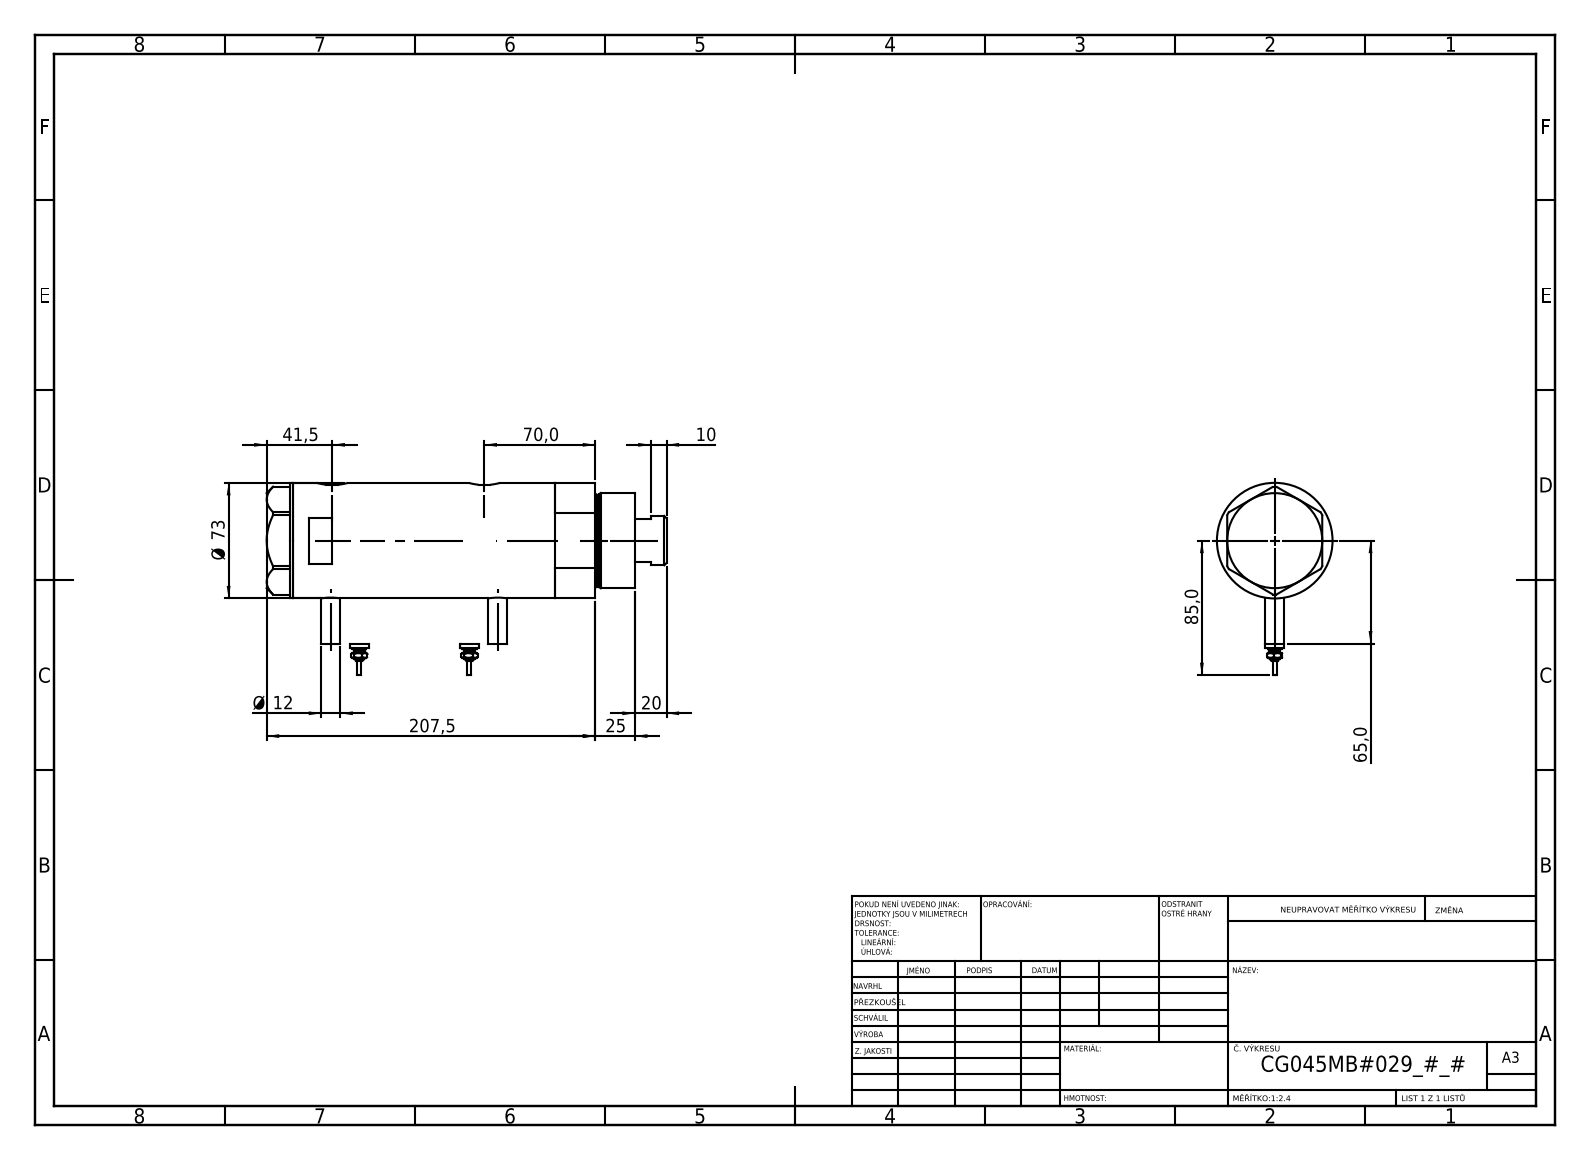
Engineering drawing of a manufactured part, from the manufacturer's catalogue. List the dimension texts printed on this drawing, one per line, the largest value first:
207,5
85,0
Ø 73
70,0
65,0
41,5
25
20
Ø 12
10
